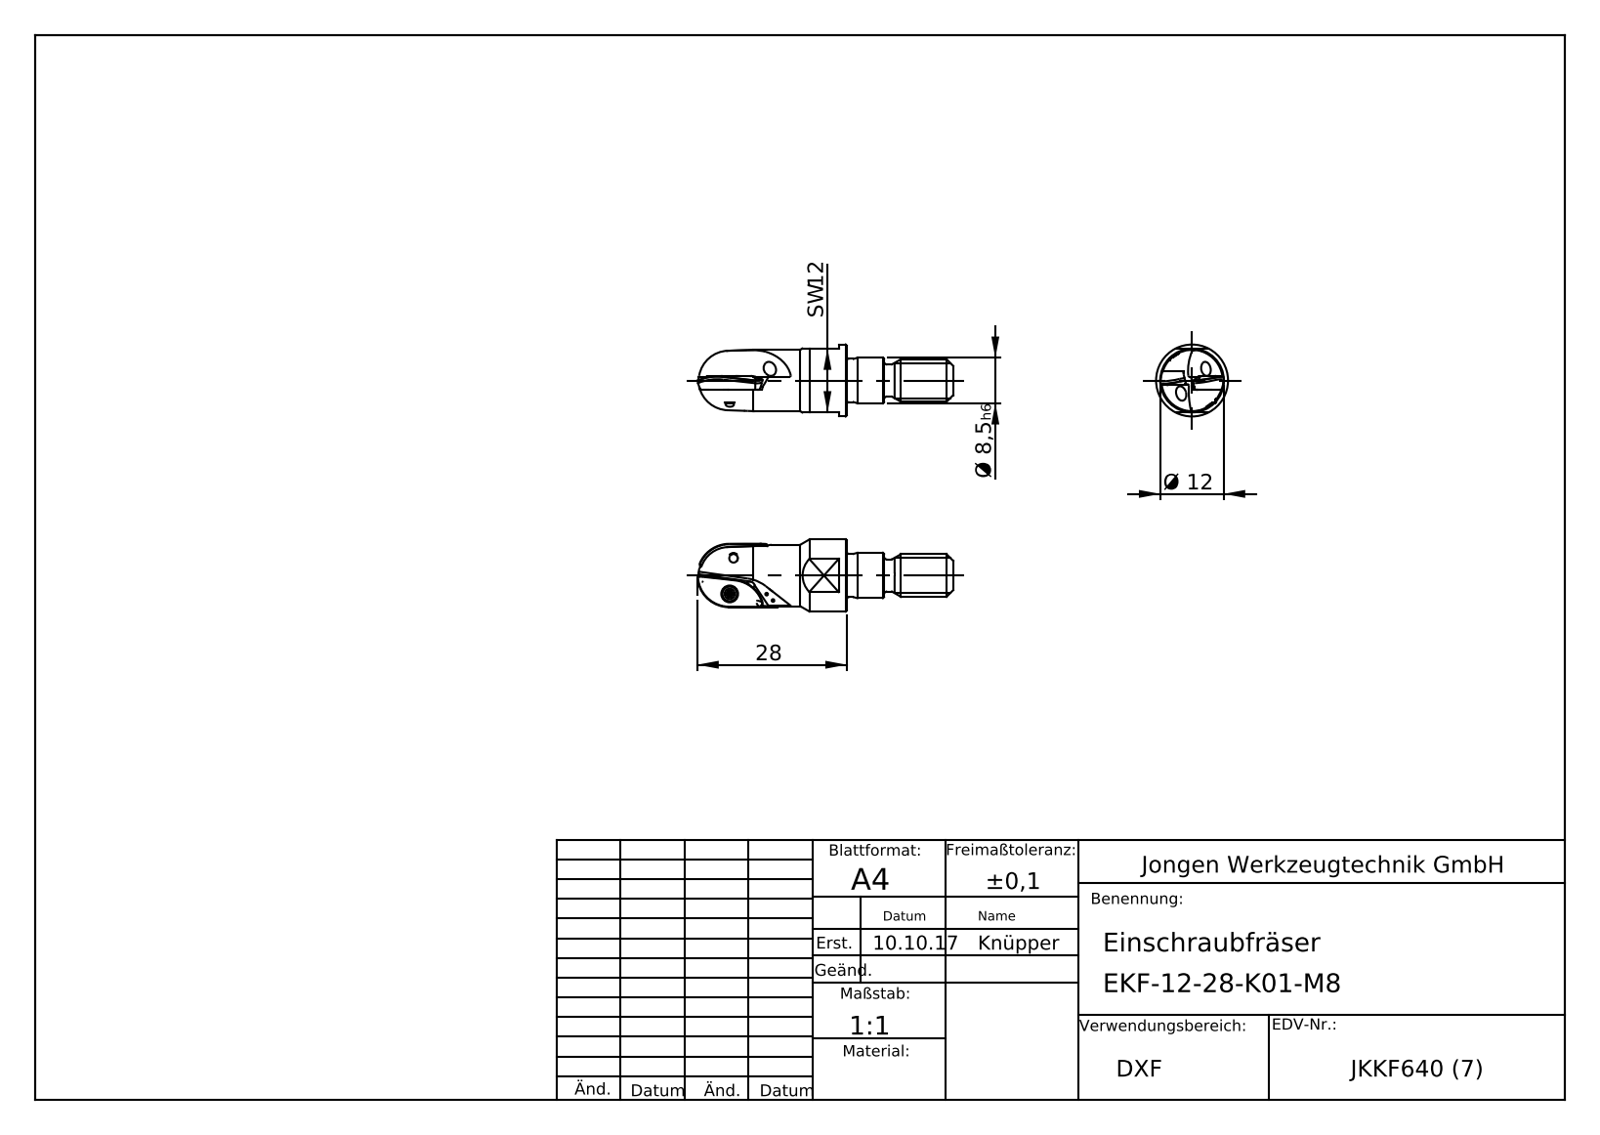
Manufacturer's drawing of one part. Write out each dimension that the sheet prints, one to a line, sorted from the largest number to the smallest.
28
SW 12
Ø 12
Ø 8,5 h6
